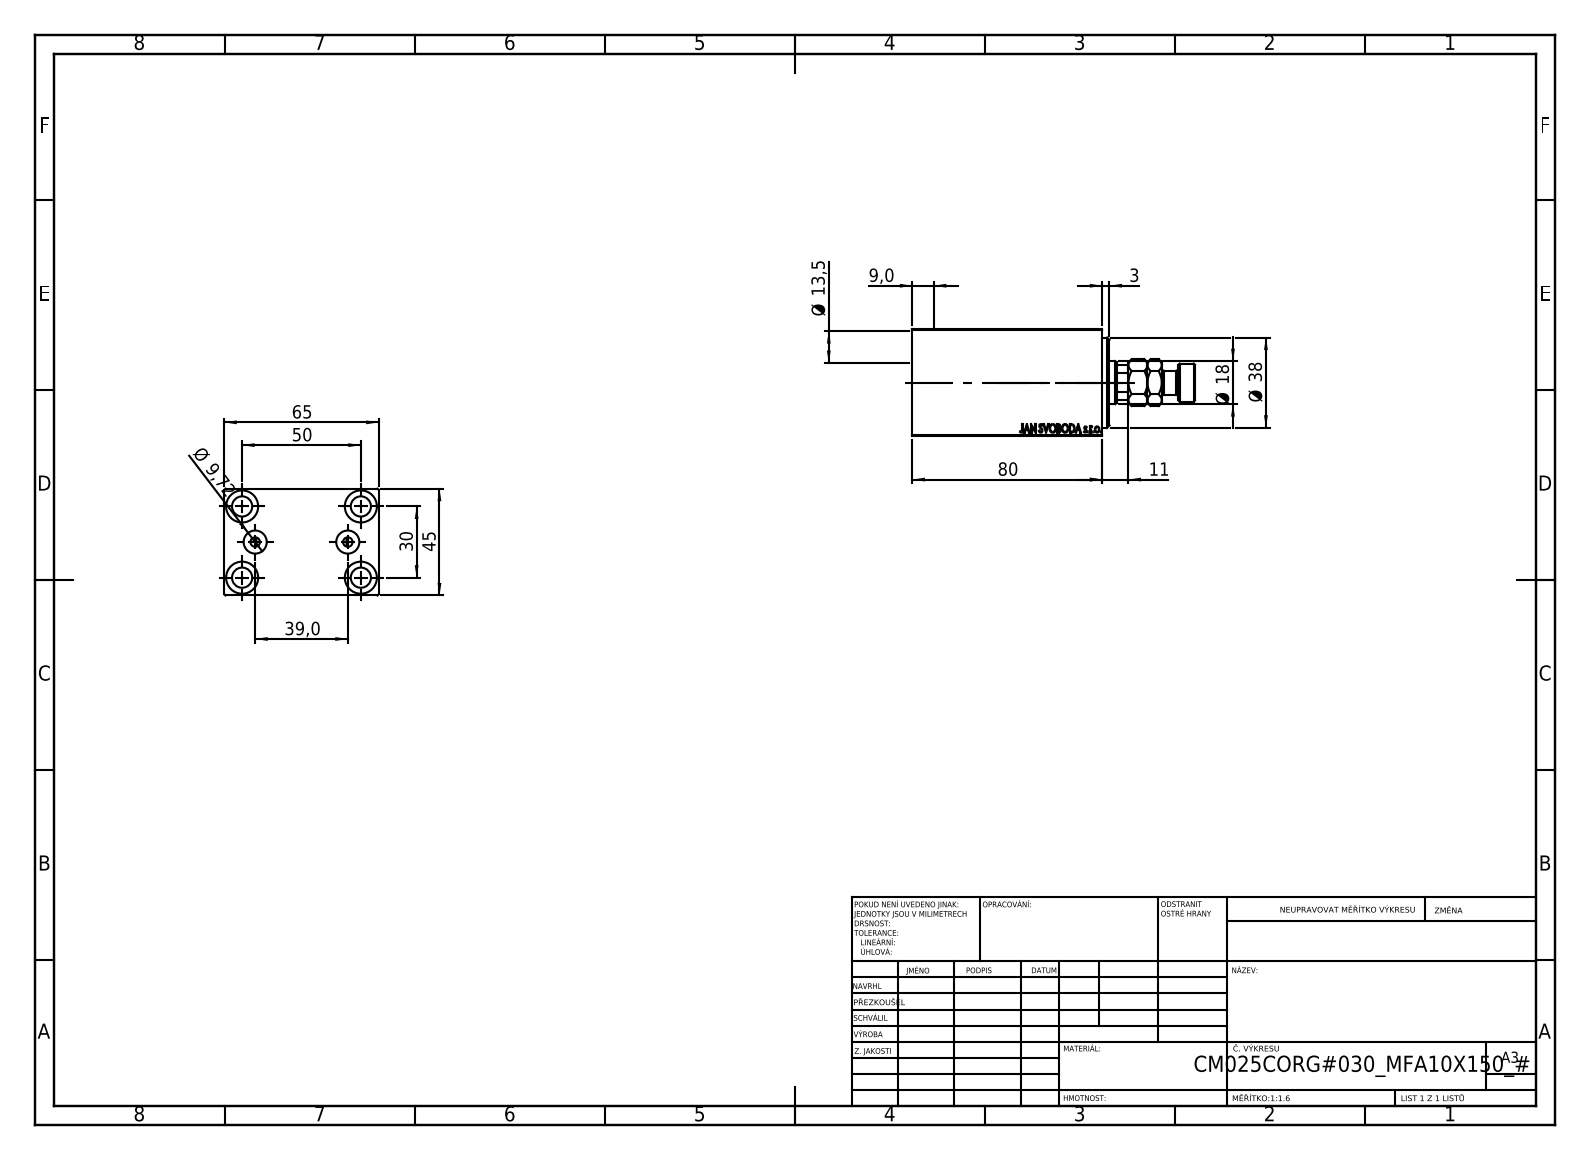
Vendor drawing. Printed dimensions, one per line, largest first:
80
65
50
45
39,0
Ø 38
30
Ø 18
Ø 13,5
11
Ø 9,72
9,0
3
